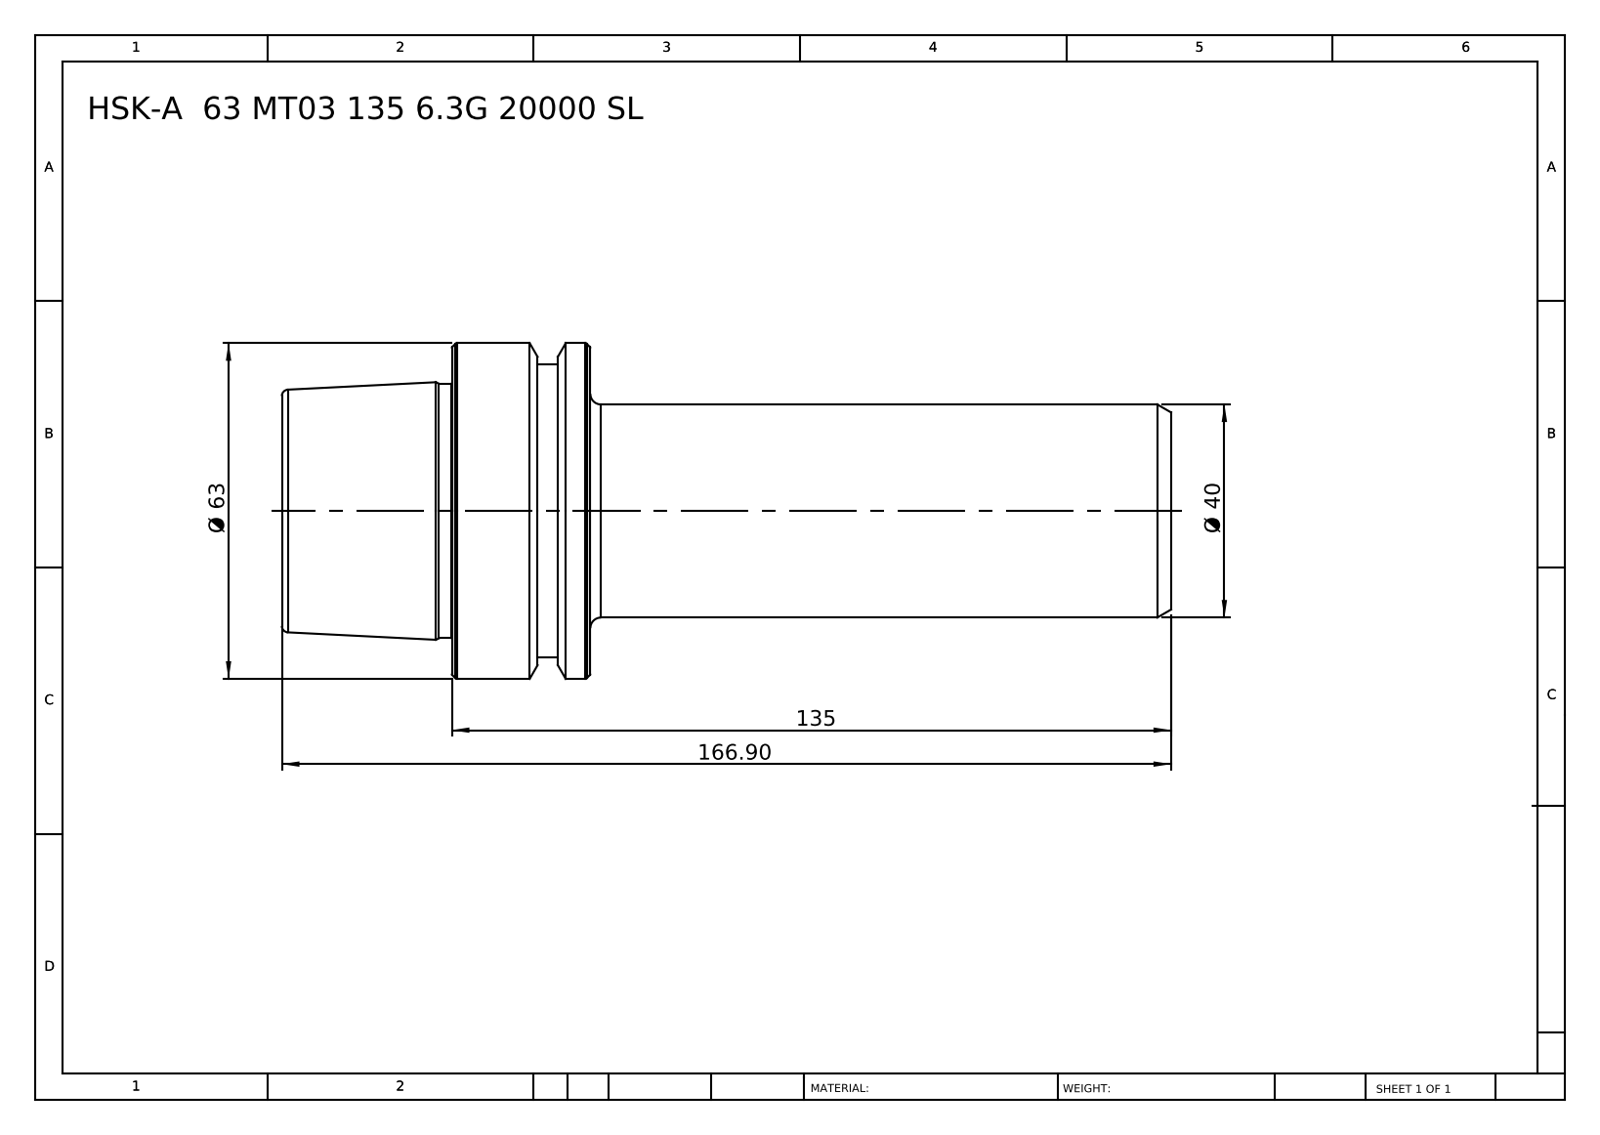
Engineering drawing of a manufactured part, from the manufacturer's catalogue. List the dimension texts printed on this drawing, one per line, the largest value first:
166.90
135
Ø 63
Ø 40
